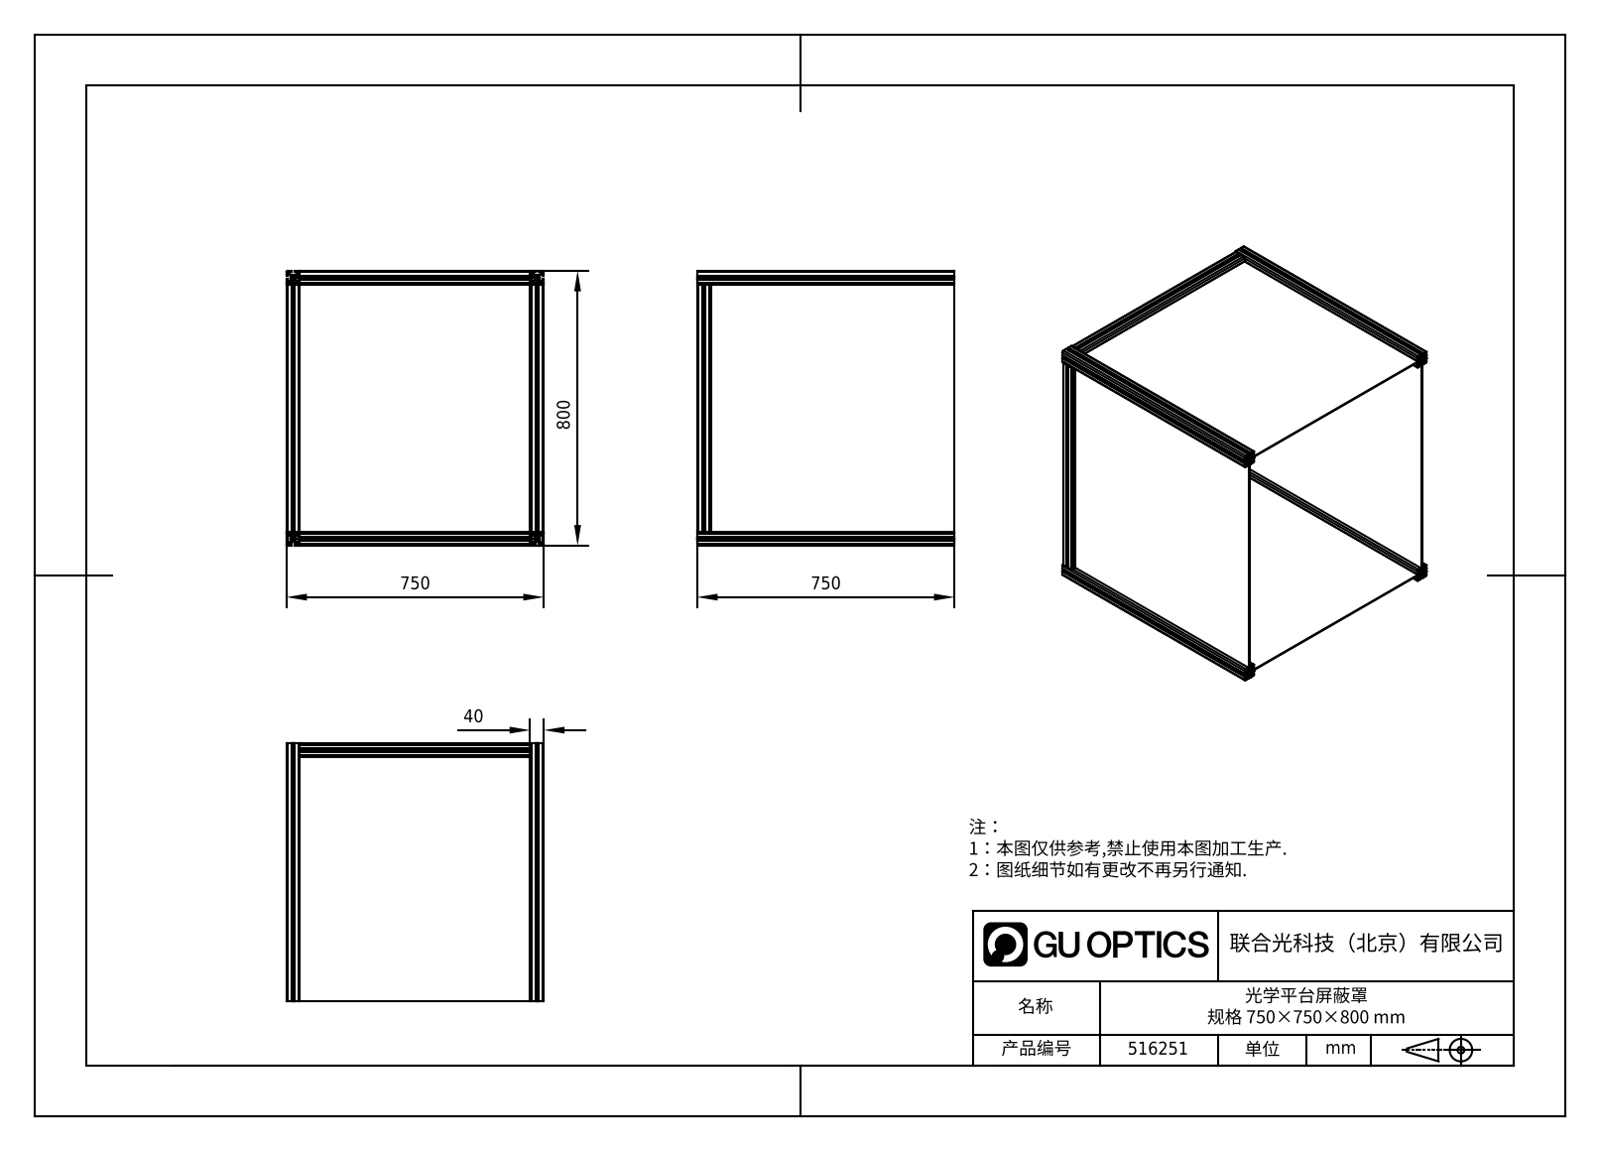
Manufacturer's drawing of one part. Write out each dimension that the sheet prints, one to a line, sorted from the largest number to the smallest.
800
750
750
40
